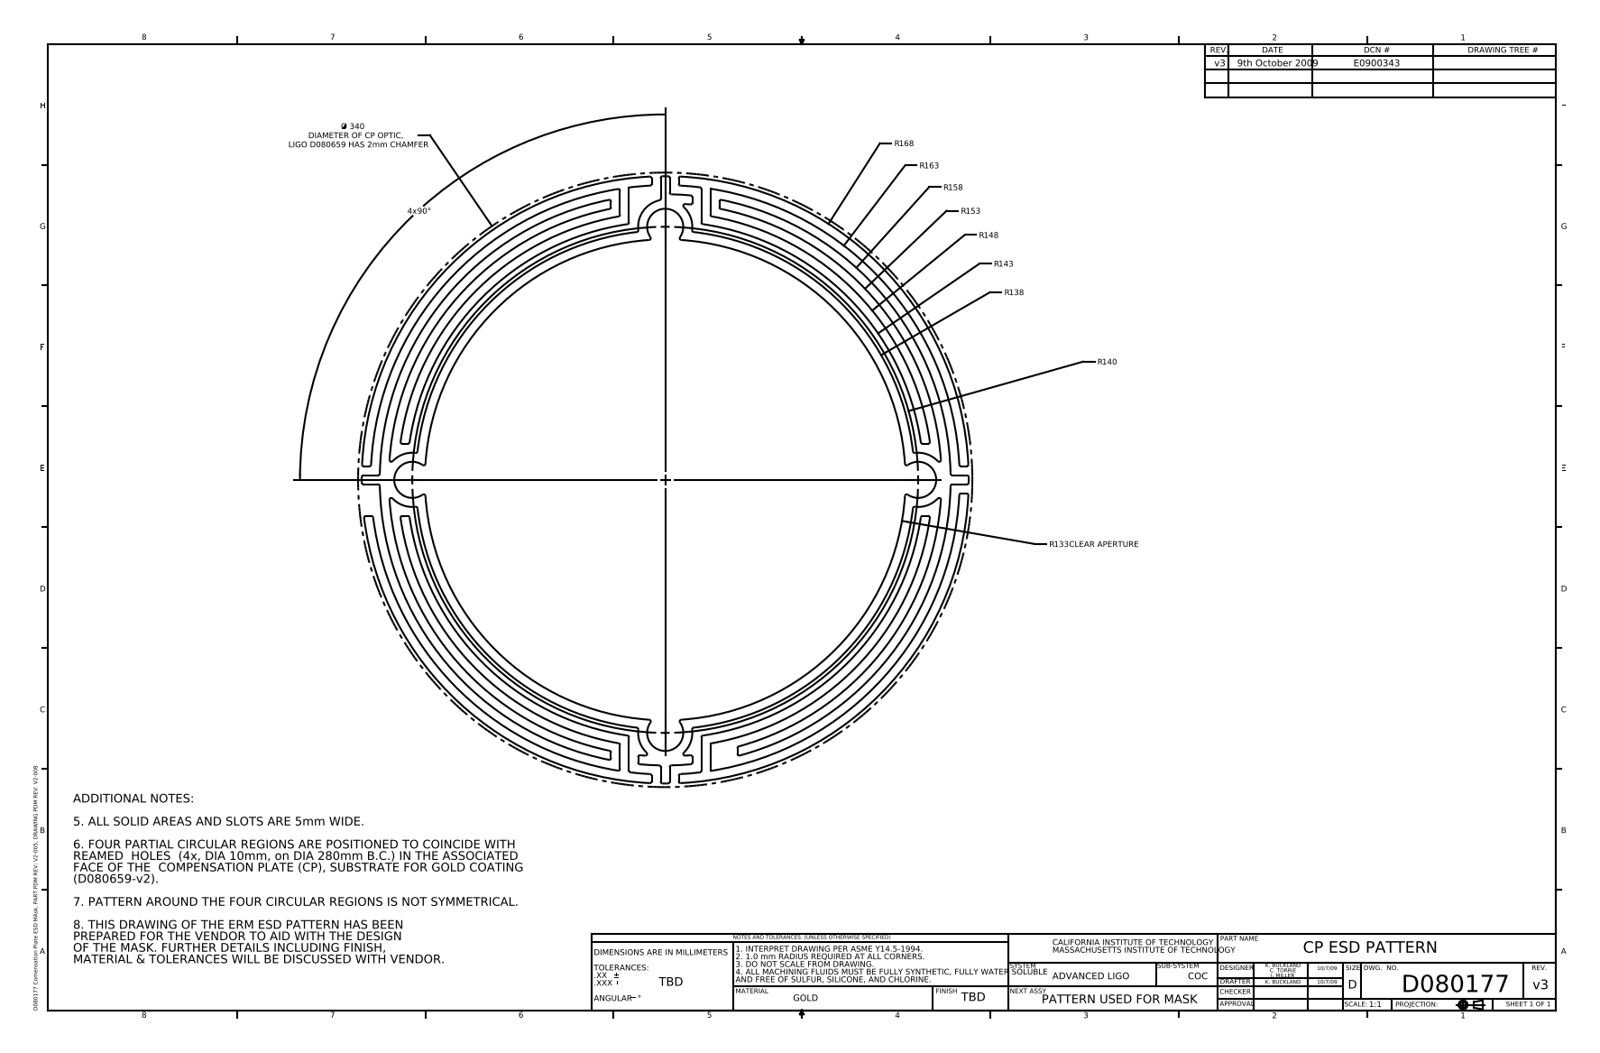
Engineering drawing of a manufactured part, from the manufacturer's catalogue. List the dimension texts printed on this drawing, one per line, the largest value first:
Ø 340 DIAMETER OF CP OPTIC, LIGO D080659 HAS 2mm CHAMFER
R 168
R 163
R 158
R 153
R 148
R 143
R 140
R 138
R 133 CLEAR APERTURE
4x 90°
